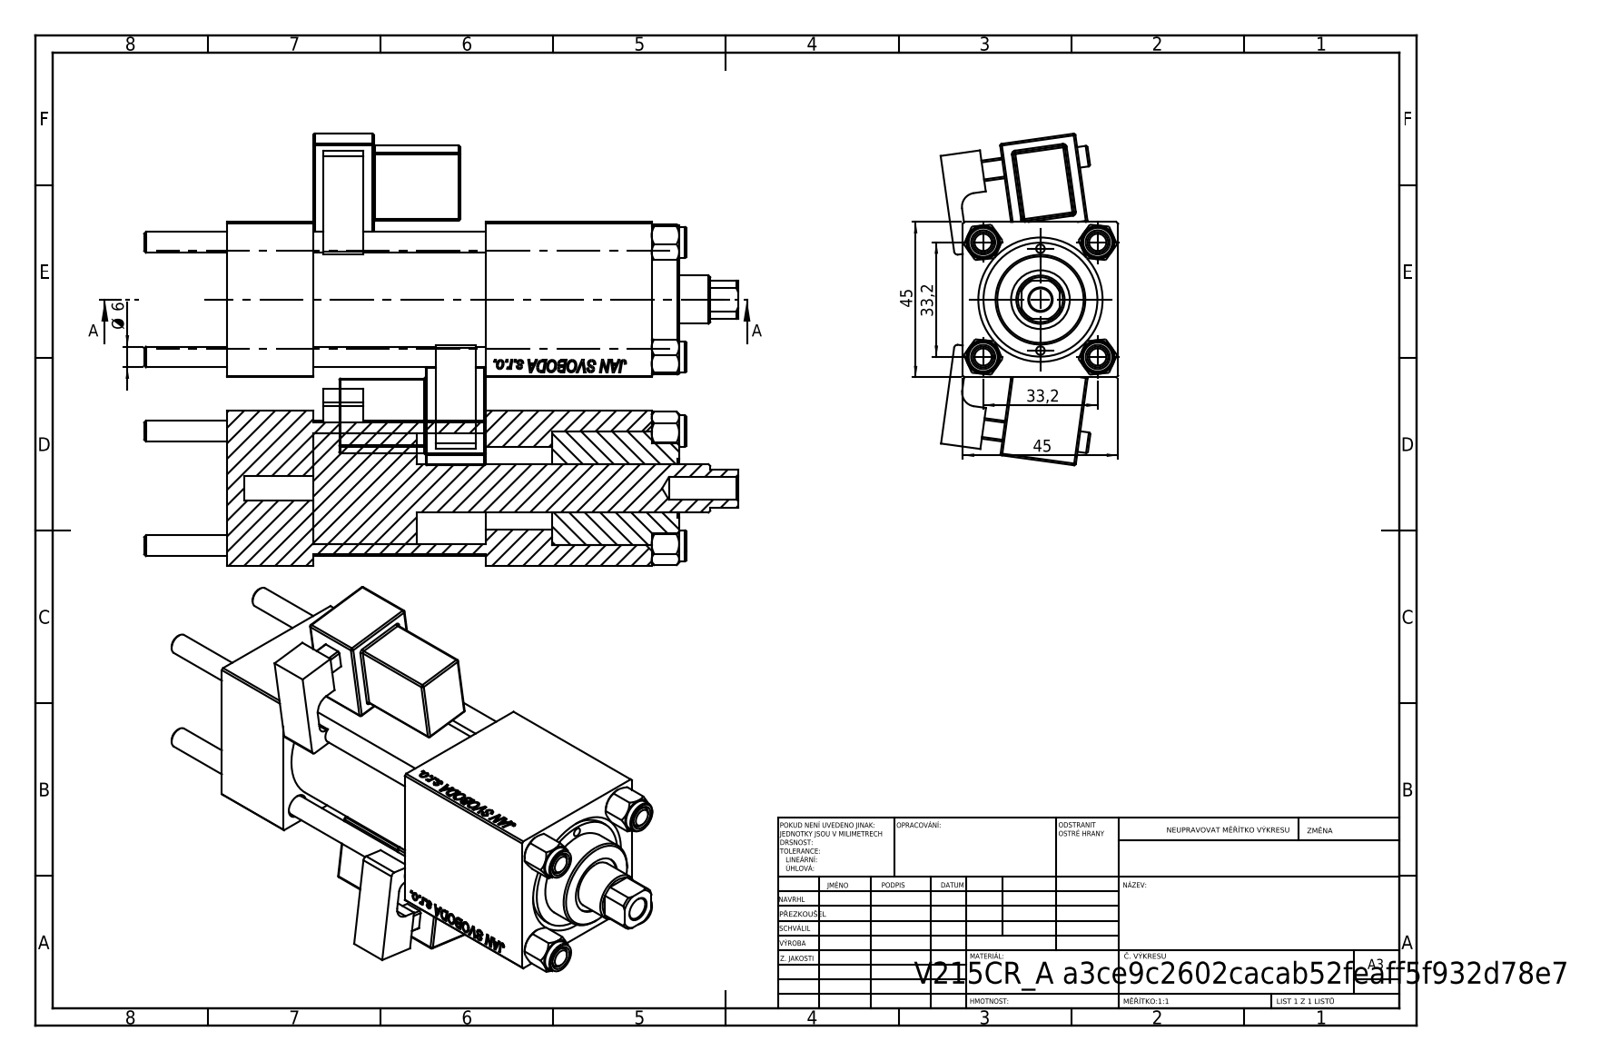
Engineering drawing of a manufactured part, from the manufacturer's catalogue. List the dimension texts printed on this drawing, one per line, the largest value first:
45
45
33,2
33,2
Ø 6
